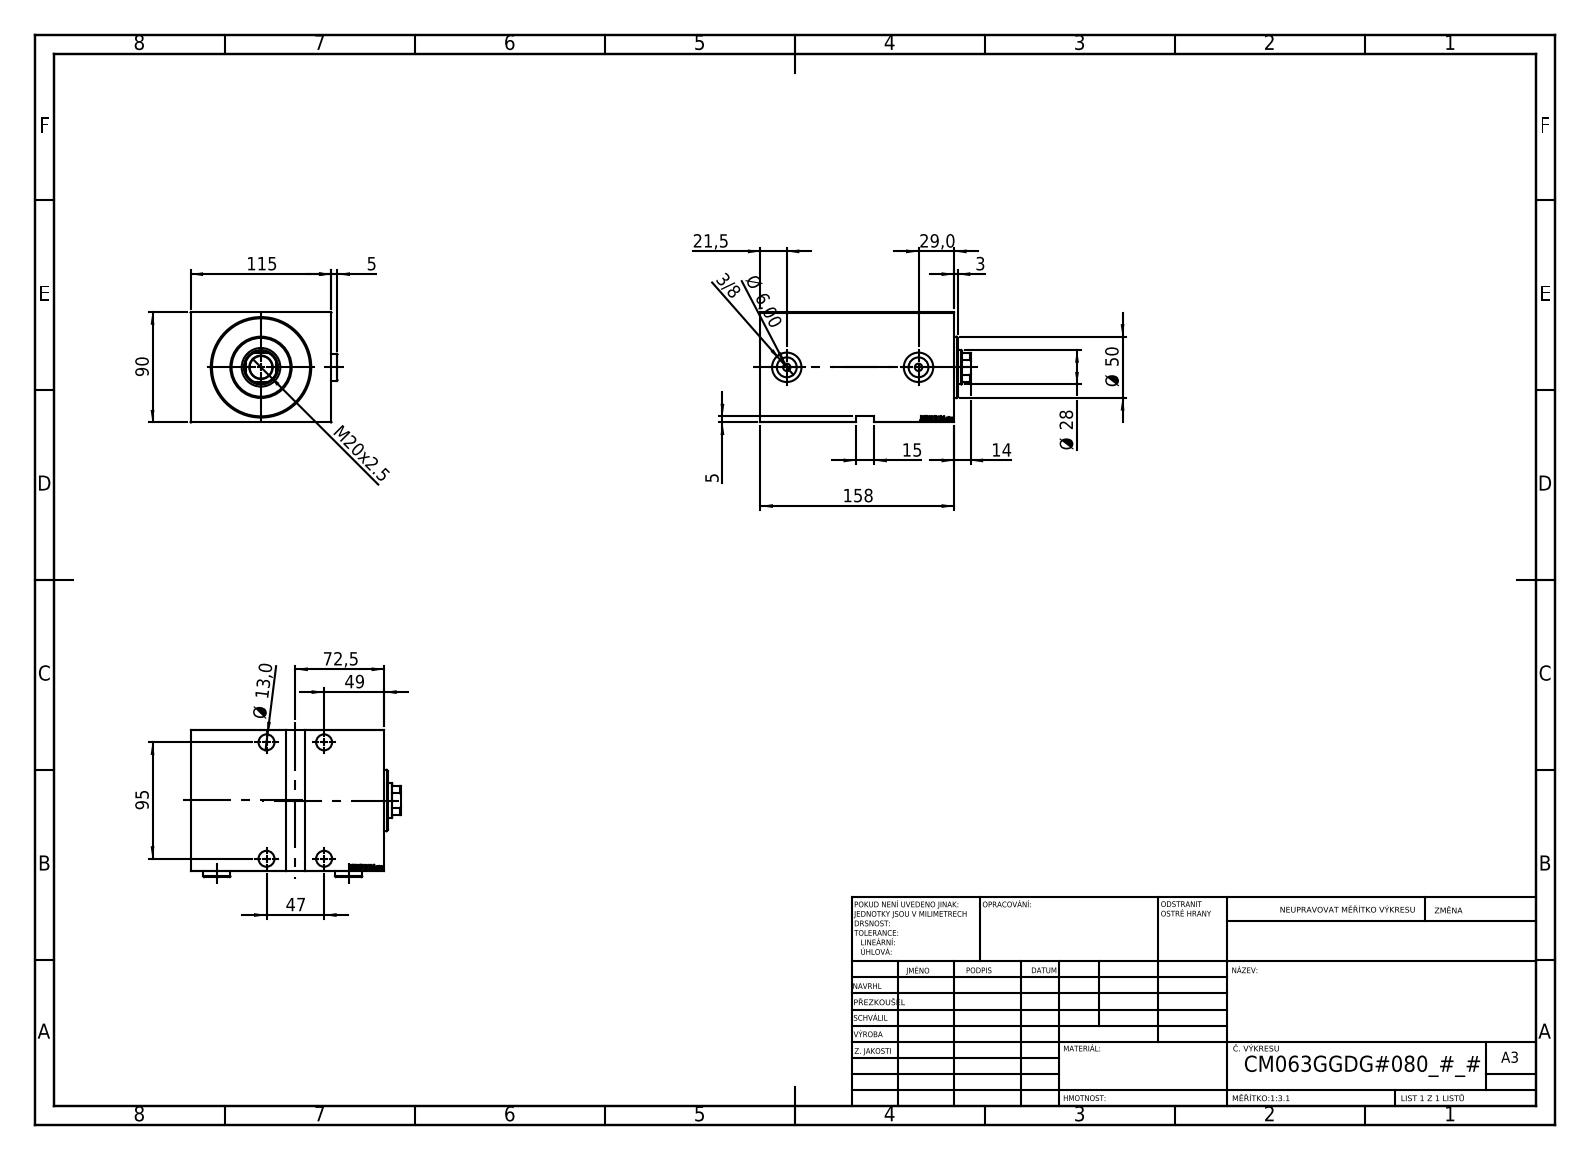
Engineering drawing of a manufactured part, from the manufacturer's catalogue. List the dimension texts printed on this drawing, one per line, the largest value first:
158
115
95
90
72,5
Ø 50
49
47
29,0
Ø 28
21,5
M20x2.5
15
14
Ø 13,0
Ø 6,00
5
5
3
3/8
